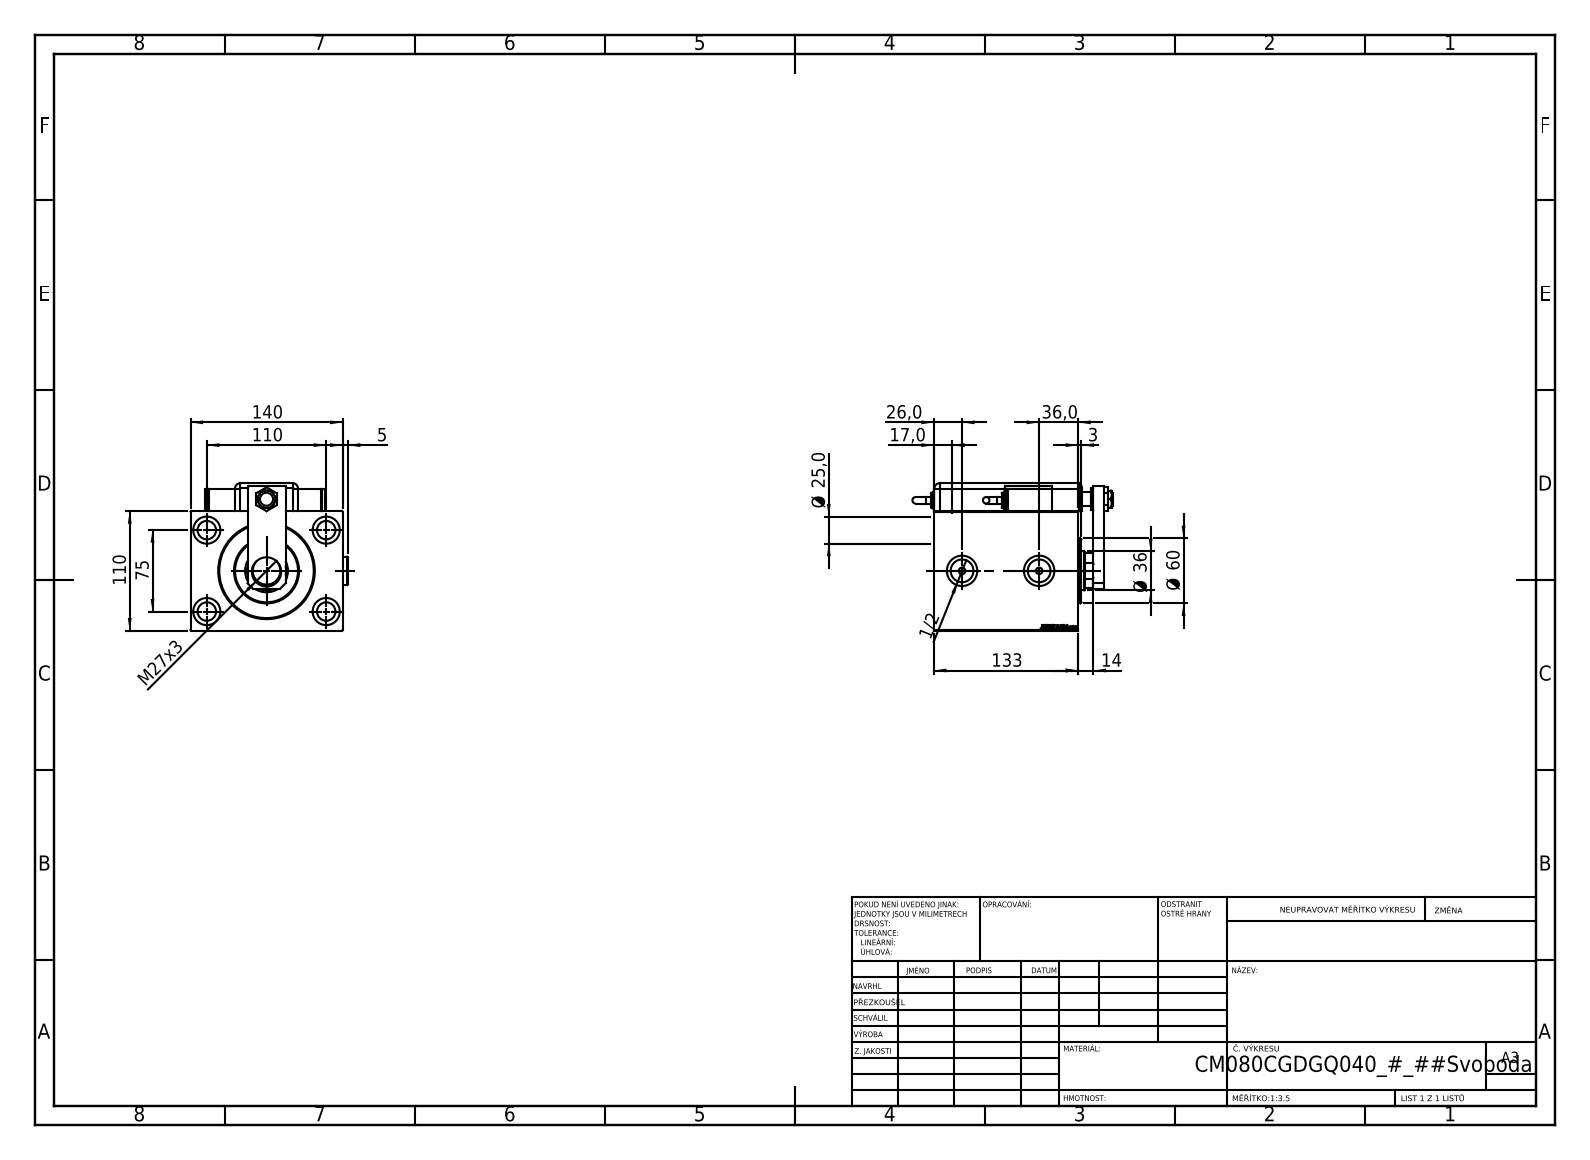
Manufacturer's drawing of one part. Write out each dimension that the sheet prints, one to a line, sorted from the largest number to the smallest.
140
133
110
110
75
Ø 60
Ø 36
36,0
M27x3
26,0
Ø 25,0
17,0
14
5
3
1/2
